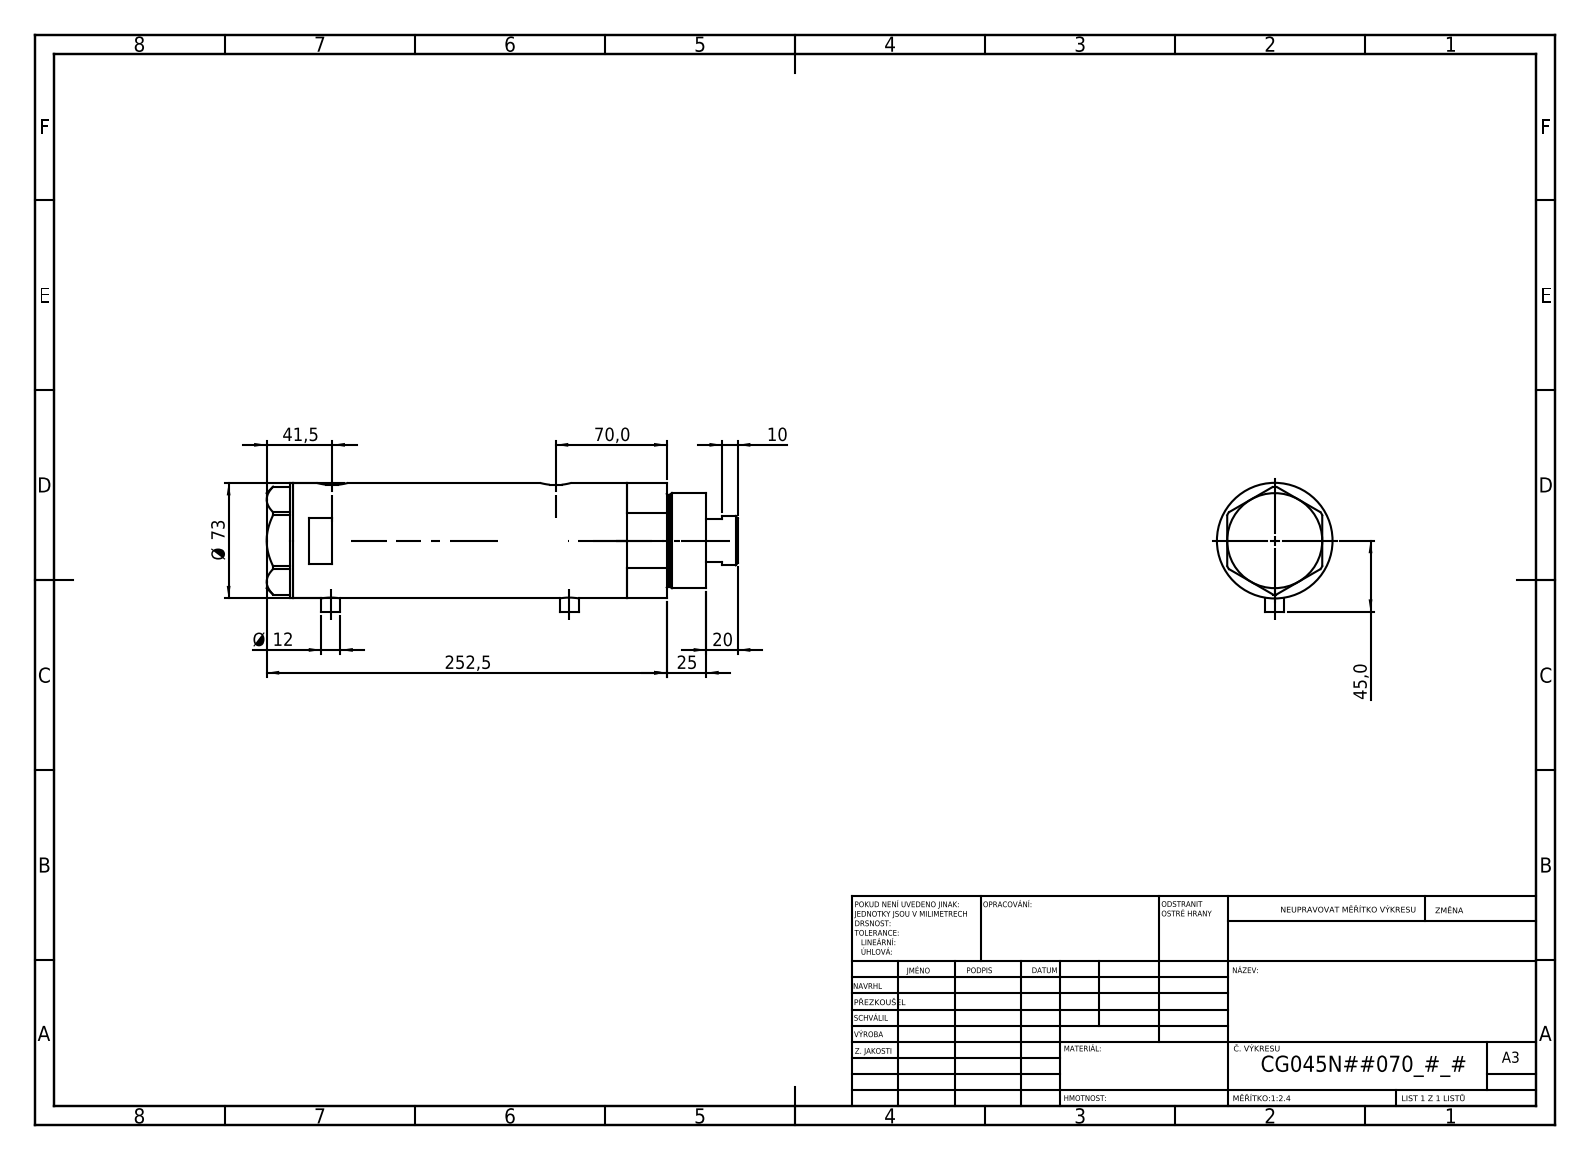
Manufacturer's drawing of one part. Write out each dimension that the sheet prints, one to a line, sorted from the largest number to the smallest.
252,5
Ø 73
70,0
45,0
41,5
25
20
Ø 12
10
